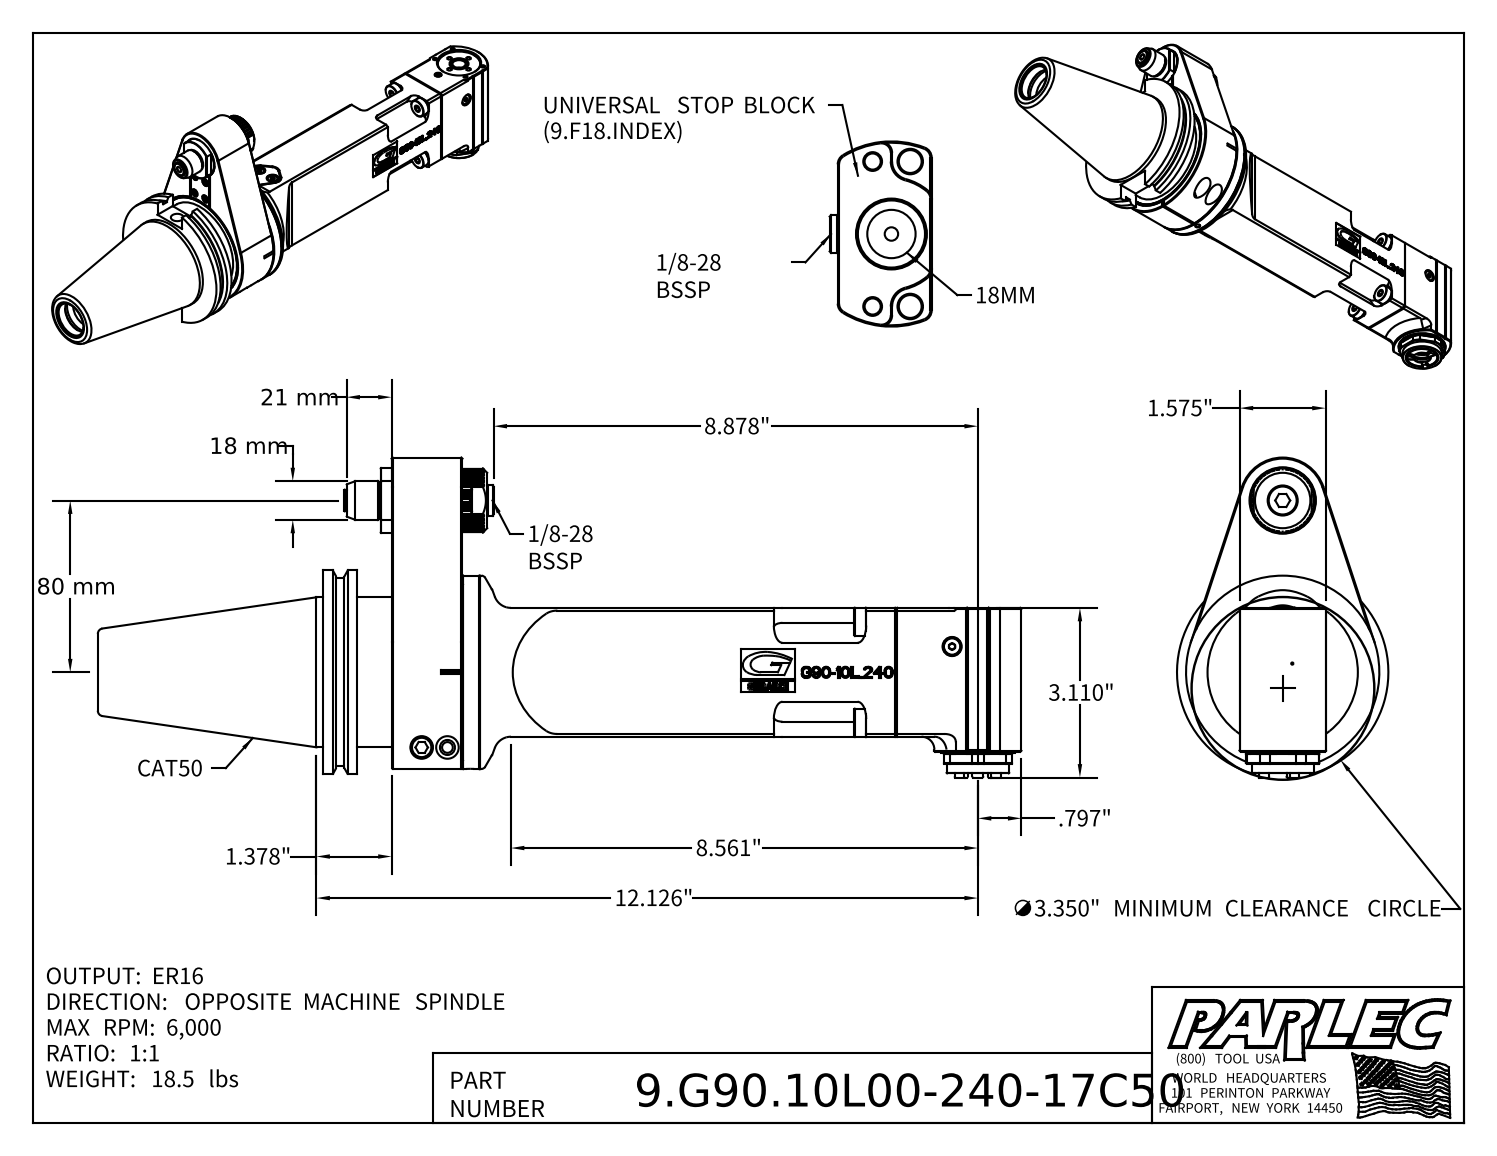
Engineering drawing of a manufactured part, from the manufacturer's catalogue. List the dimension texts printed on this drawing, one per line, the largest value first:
80 mm
21 mm
18 mm
12.126"
8.878"
8.561"
∅3.350" MINIMUM CLEARANCE CIRCLE
3.110"
1.575"
1.378"
.797"
